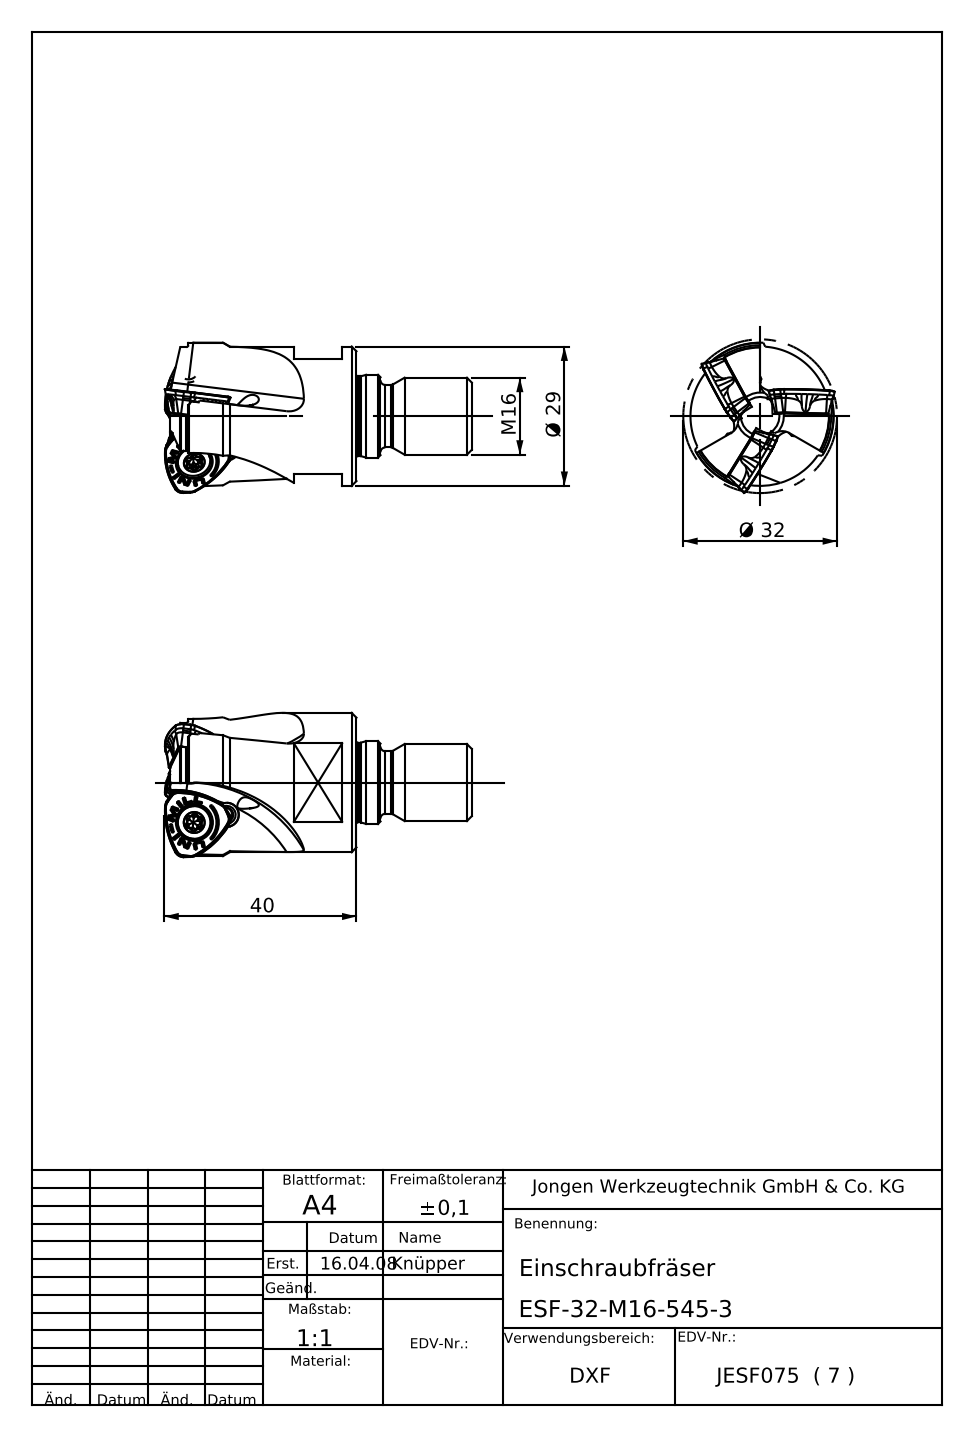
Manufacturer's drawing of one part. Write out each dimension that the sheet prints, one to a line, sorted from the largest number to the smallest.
40
Ø 32
Ø 29
M 16
